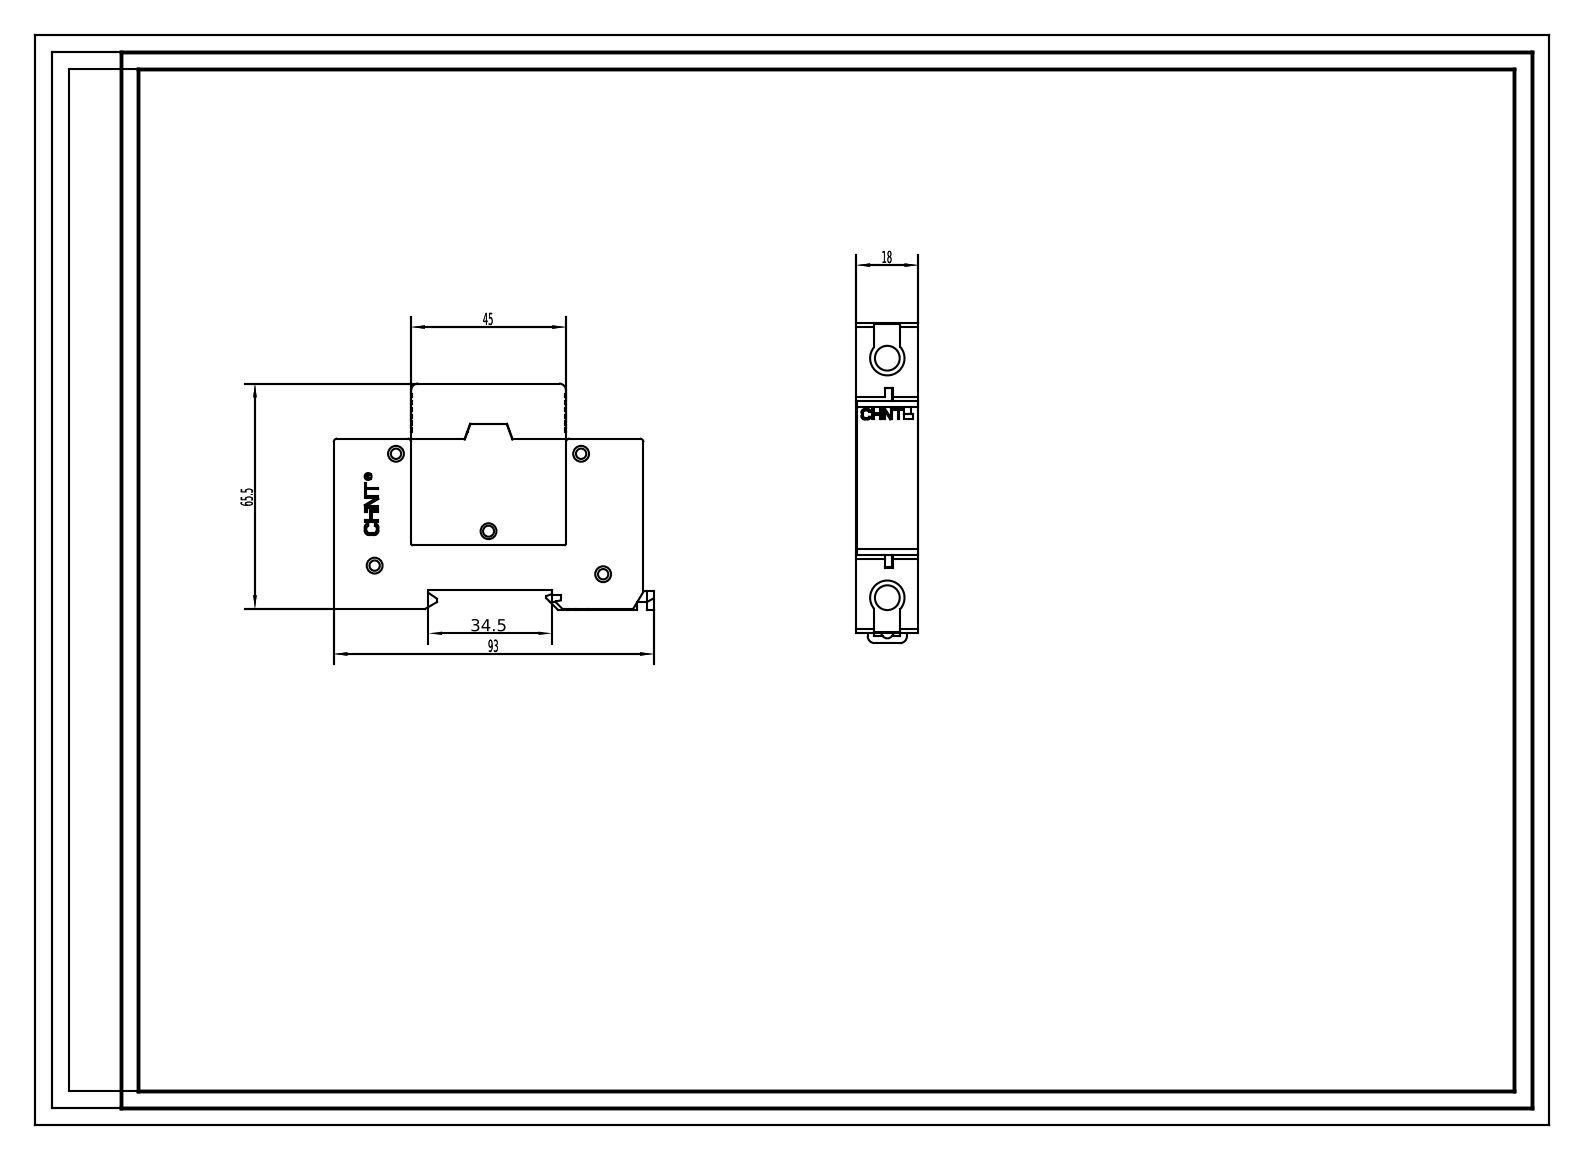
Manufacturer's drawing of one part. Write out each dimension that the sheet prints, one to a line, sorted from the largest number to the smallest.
93 93
65.5 65.5
45 45
34.5
18 18
